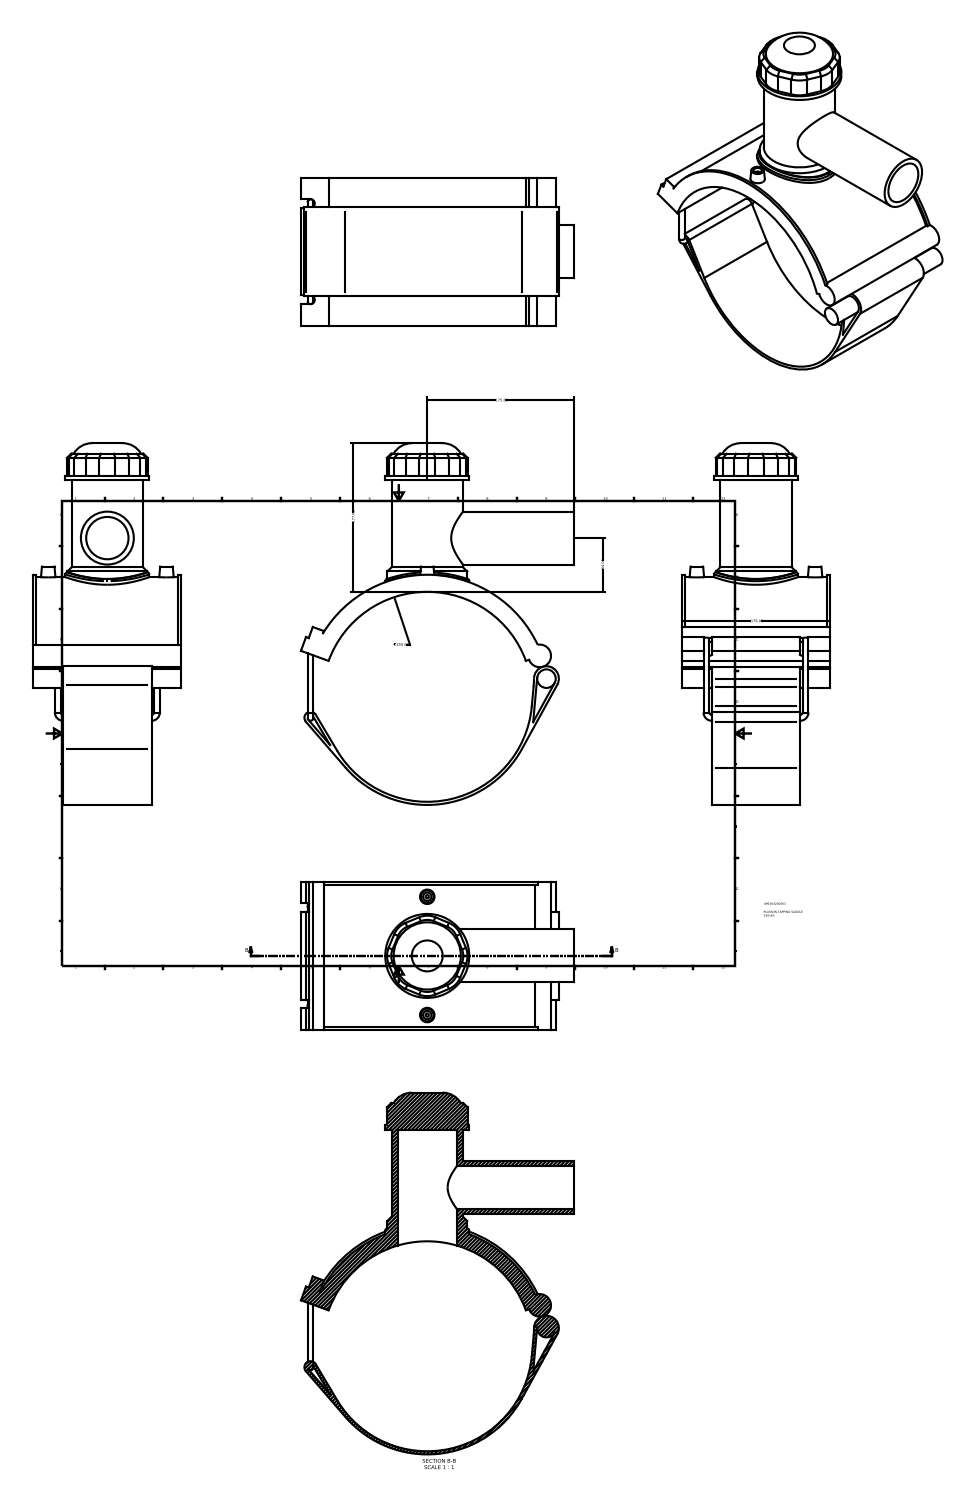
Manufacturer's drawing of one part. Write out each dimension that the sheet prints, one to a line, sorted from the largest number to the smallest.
∅250.00
177.00
176.00
175.00
64.00
